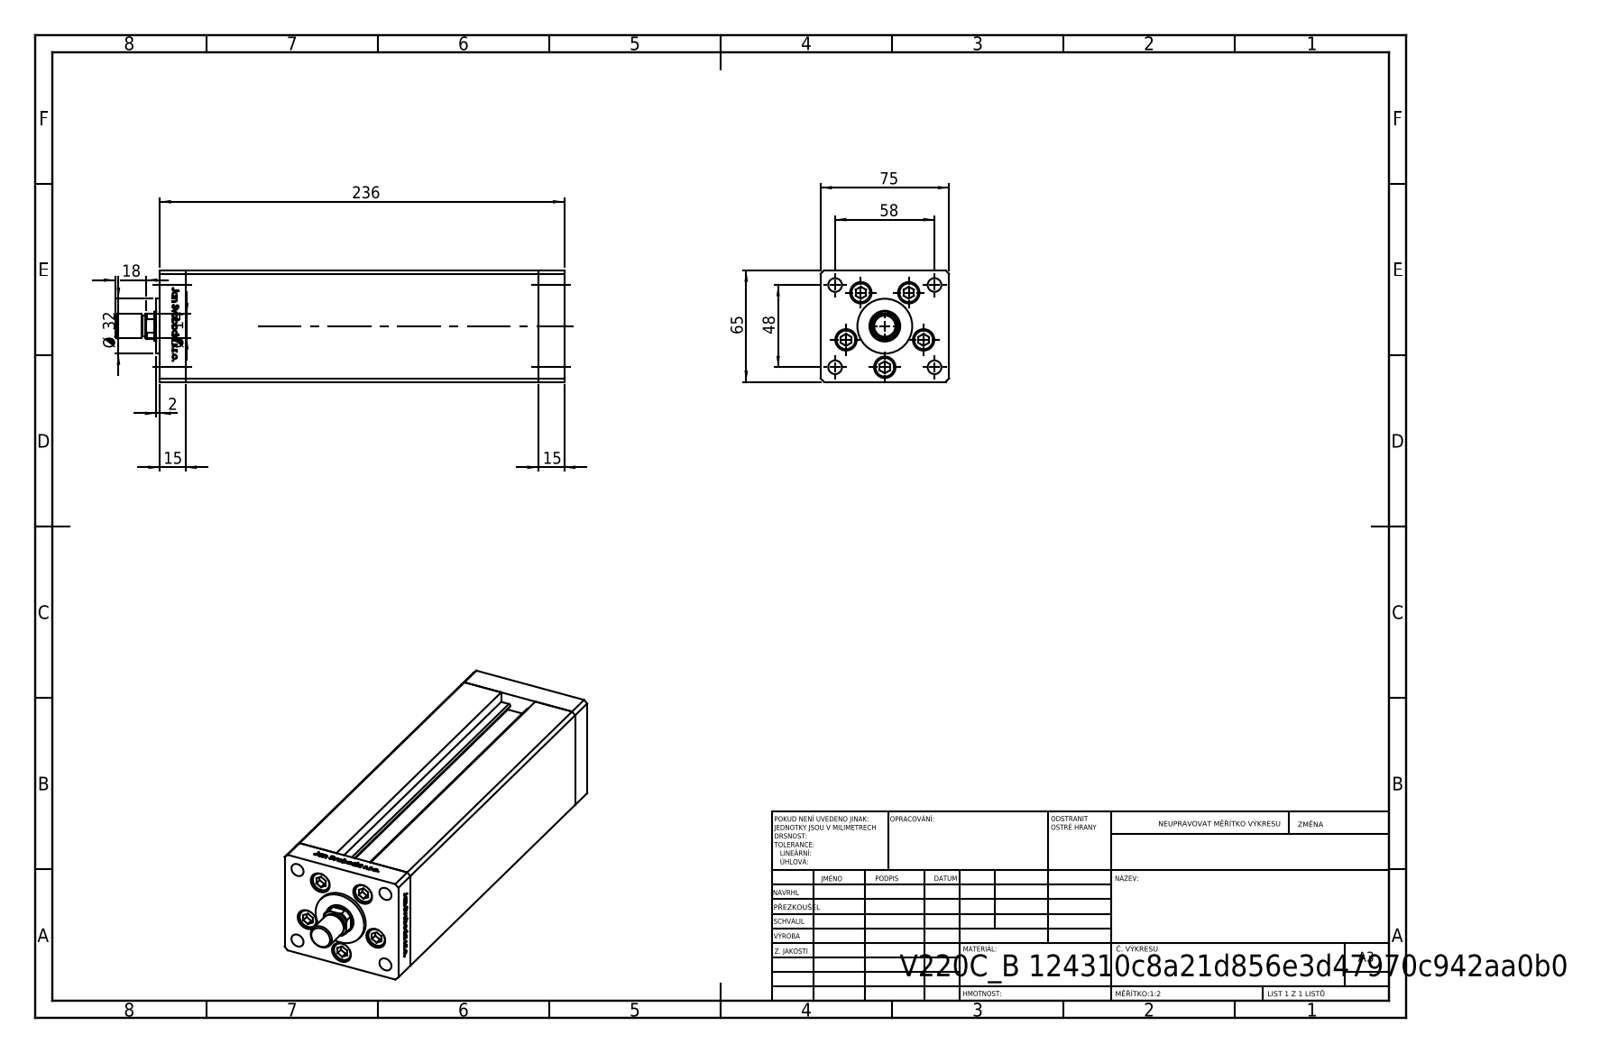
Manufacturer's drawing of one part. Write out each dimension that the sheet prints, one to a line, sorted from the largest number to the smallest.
236
75
65
58
48
Ø 32
18
15
15
Ø 14
2
